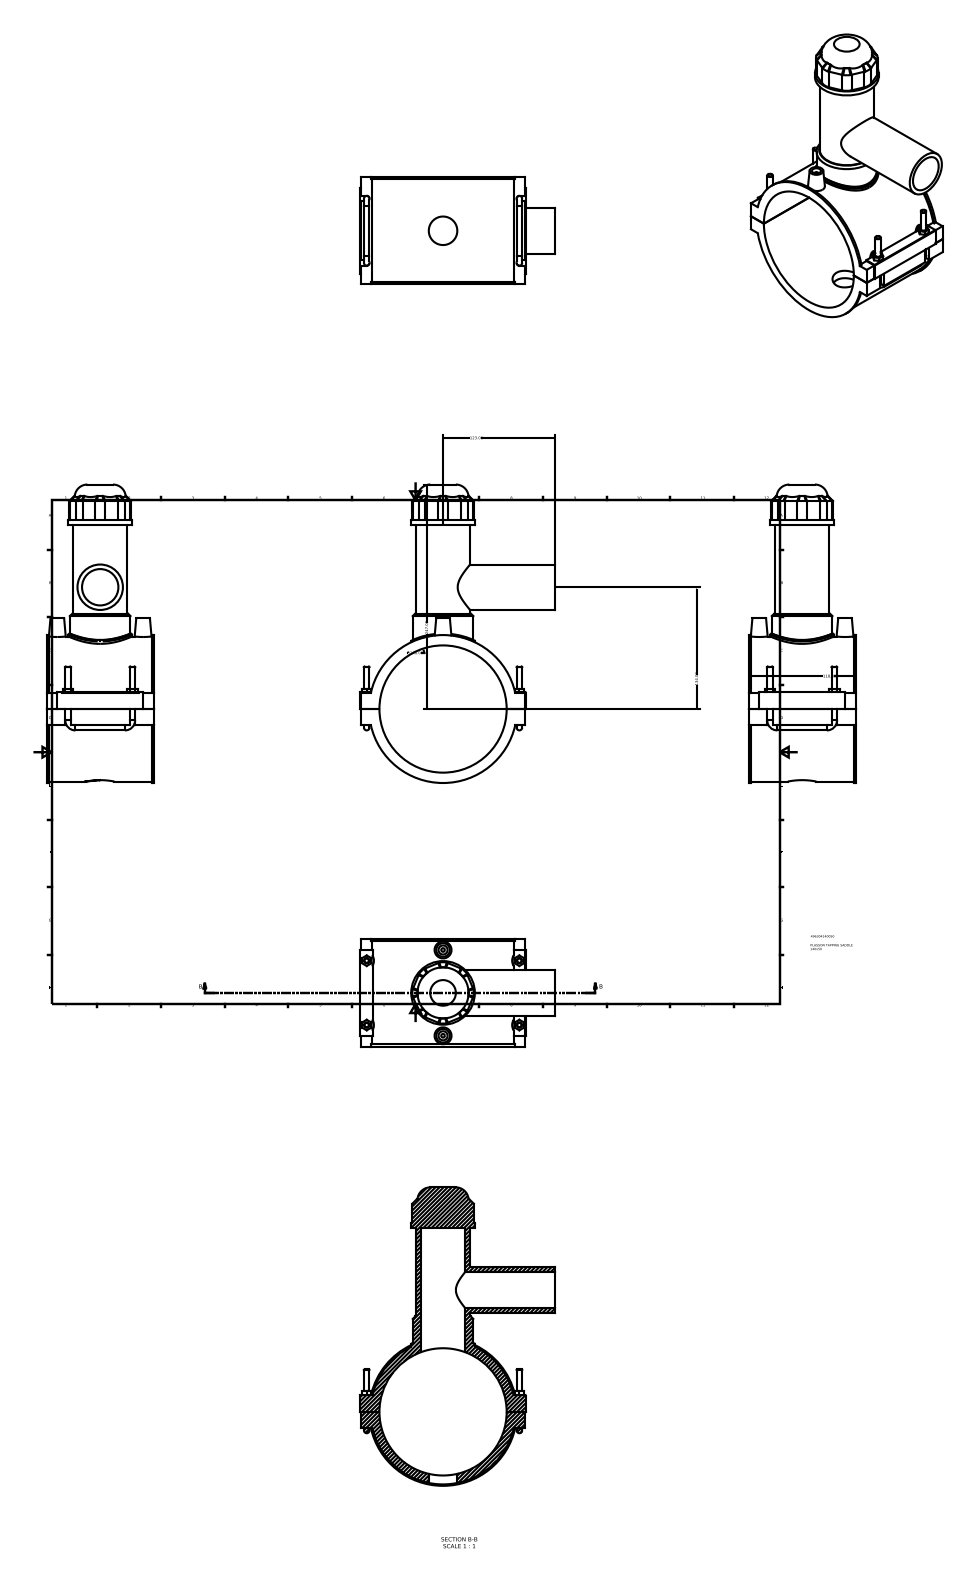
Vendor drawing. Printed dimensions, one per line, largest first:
247.00
∅140.00
134.00
123.00
118.00
